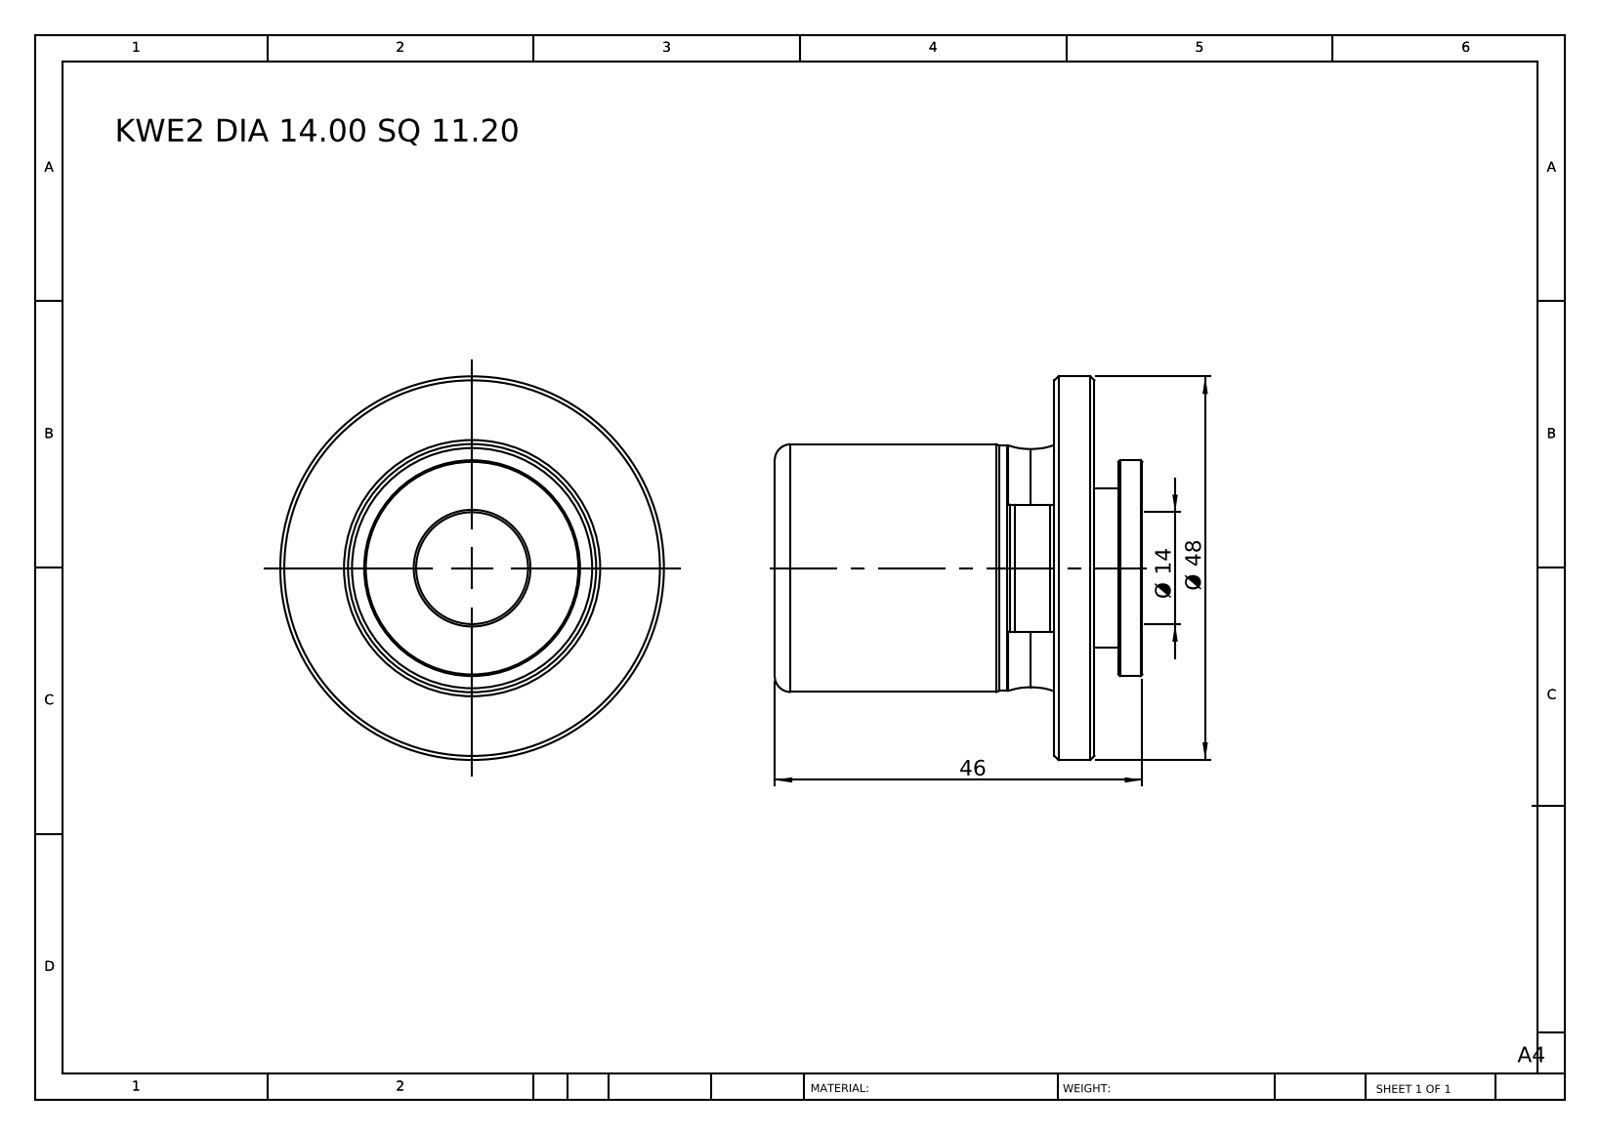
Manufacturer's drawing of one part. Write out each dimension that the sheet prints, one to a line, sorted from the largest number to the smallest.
Ø 48
46
Ø 14
